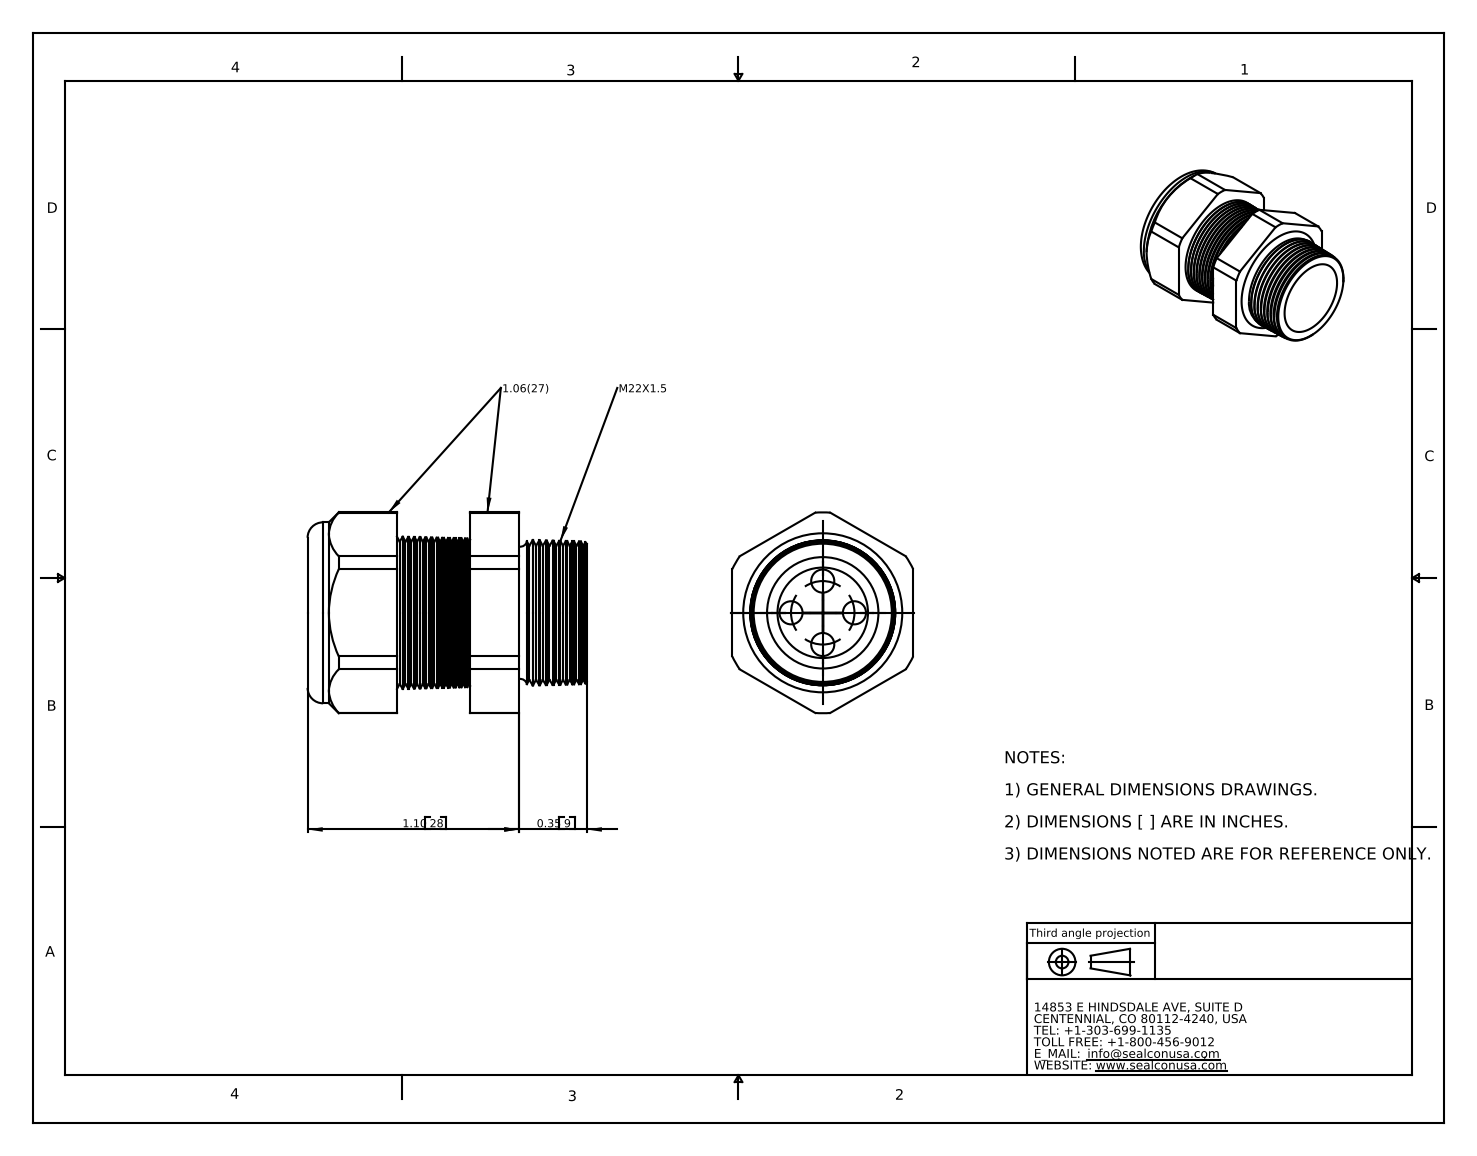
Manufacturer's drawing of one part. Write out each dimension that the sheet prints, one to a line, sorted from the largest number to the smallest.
1.10 28
0.35 9
